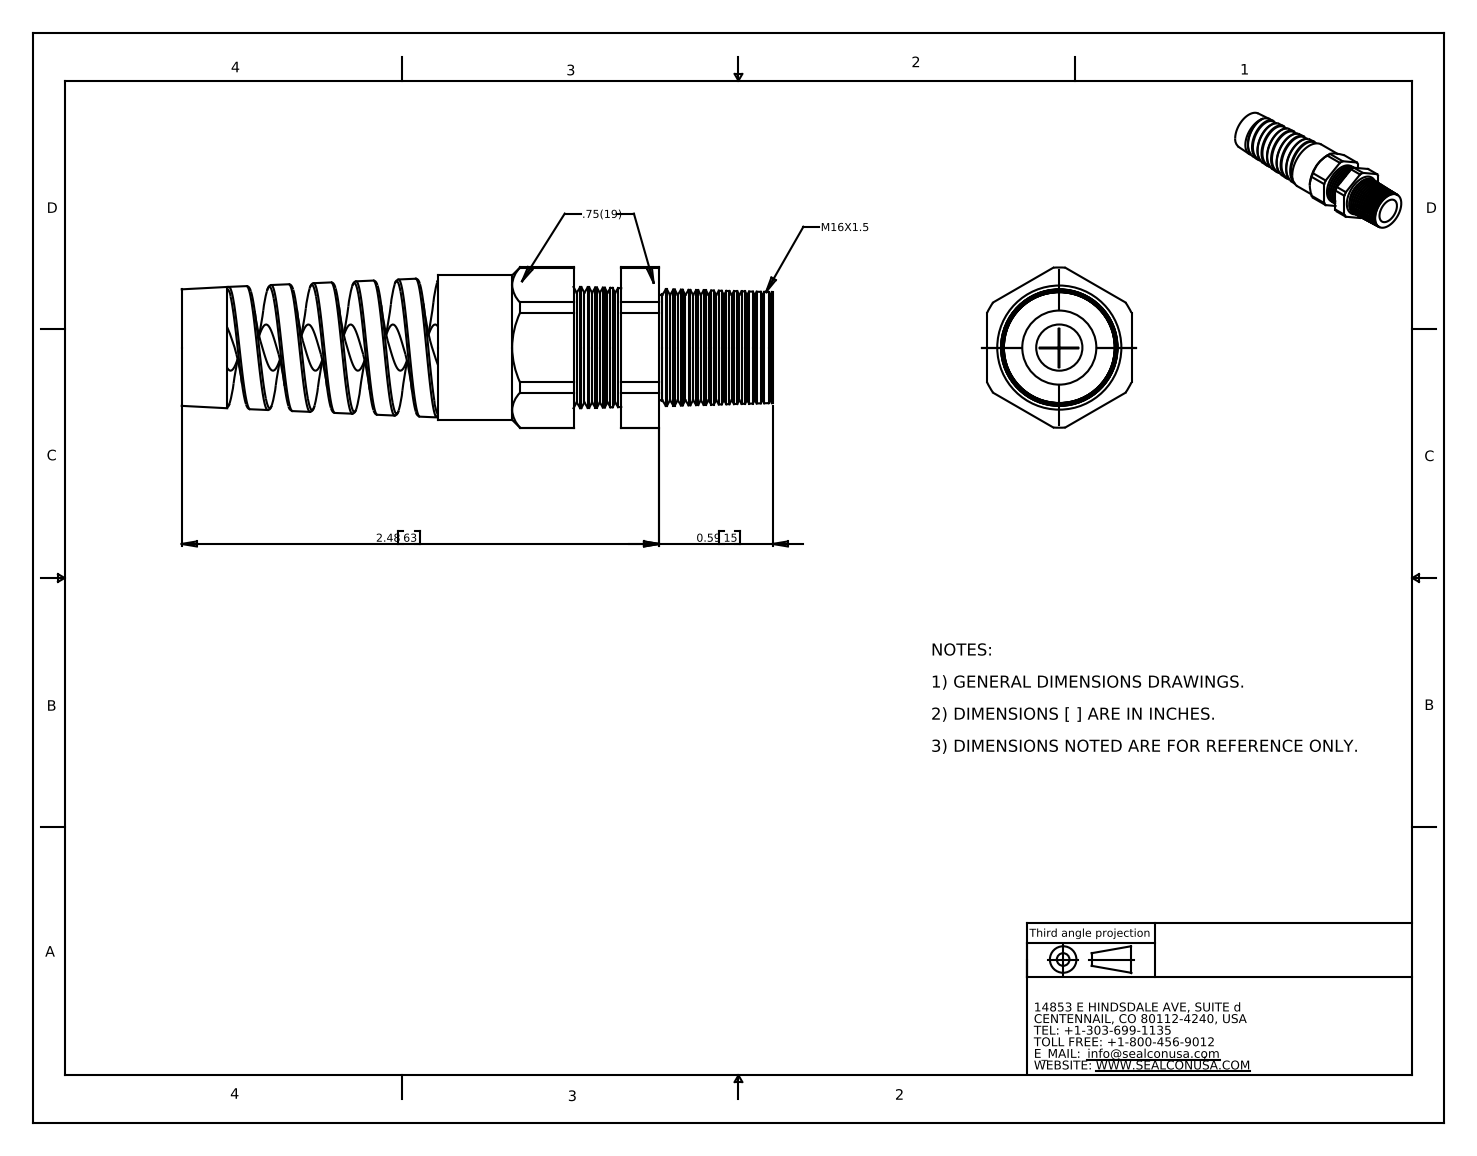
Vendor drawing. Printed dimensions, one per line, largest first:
2.48 63
0.59 15
